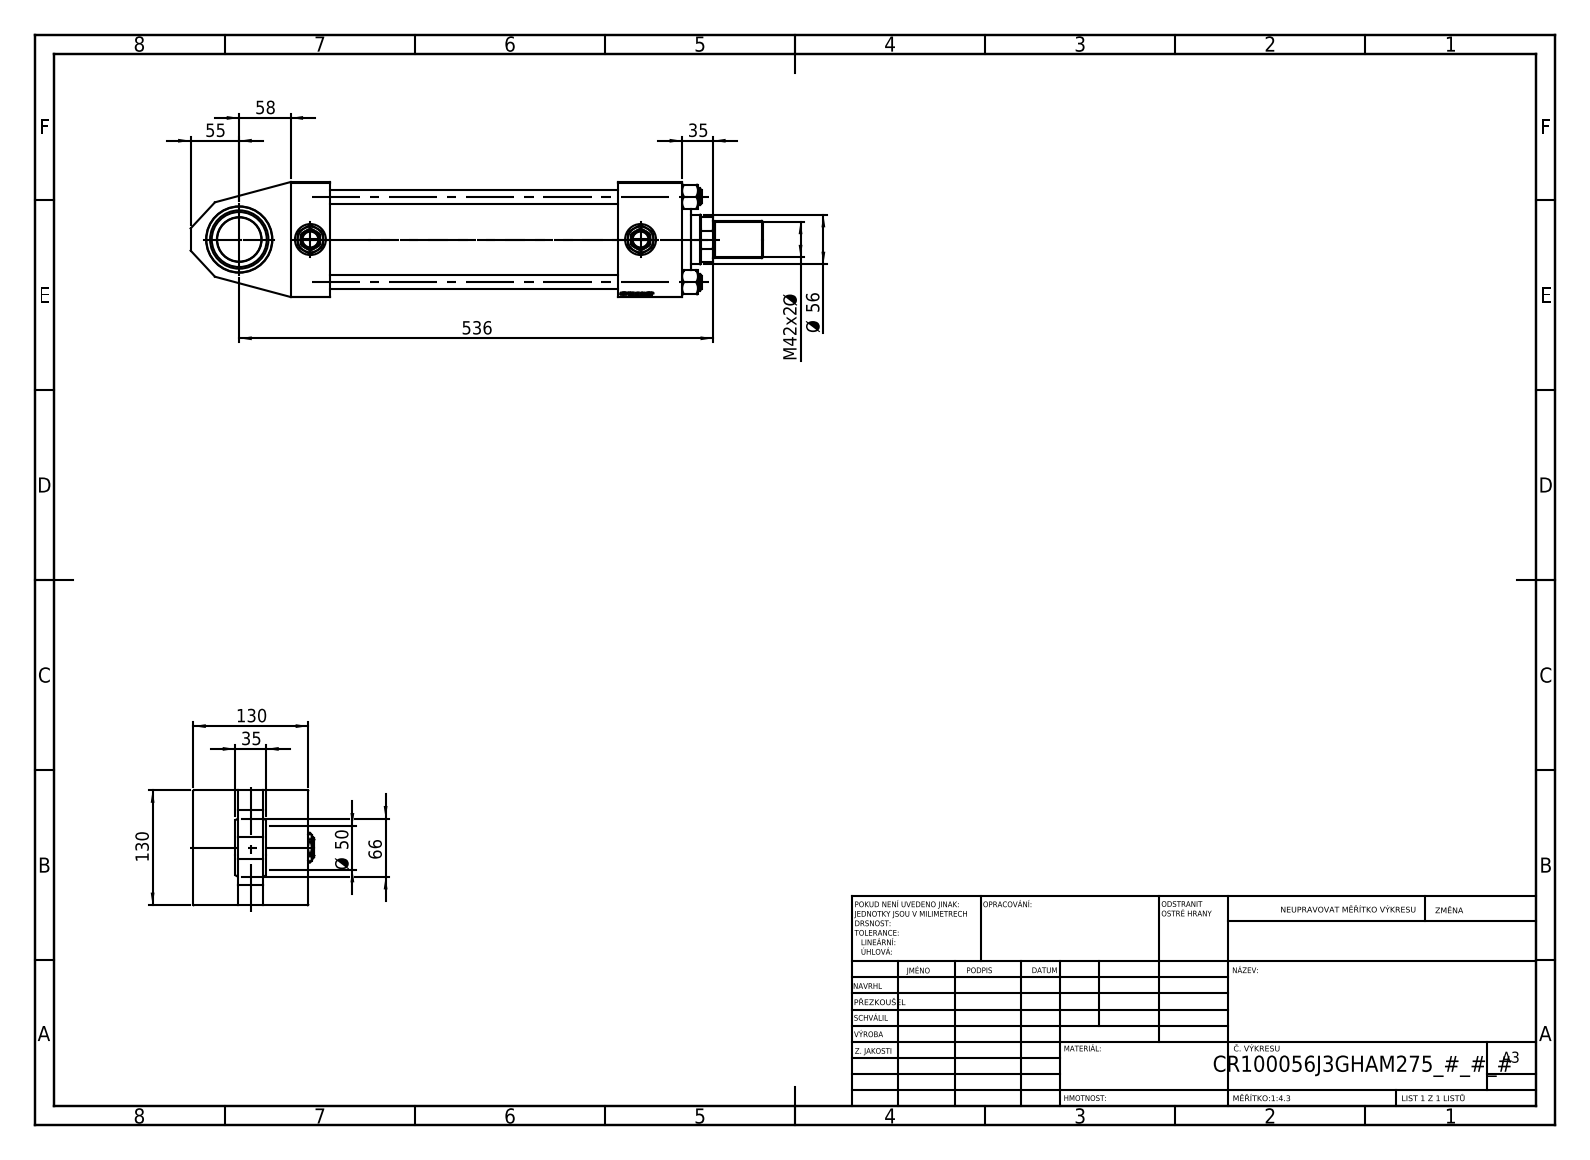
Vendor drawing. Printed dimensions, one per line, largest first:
536
130
130
66
58
Ø 56
55
Ø 50
M42x2 Ø
35
35
